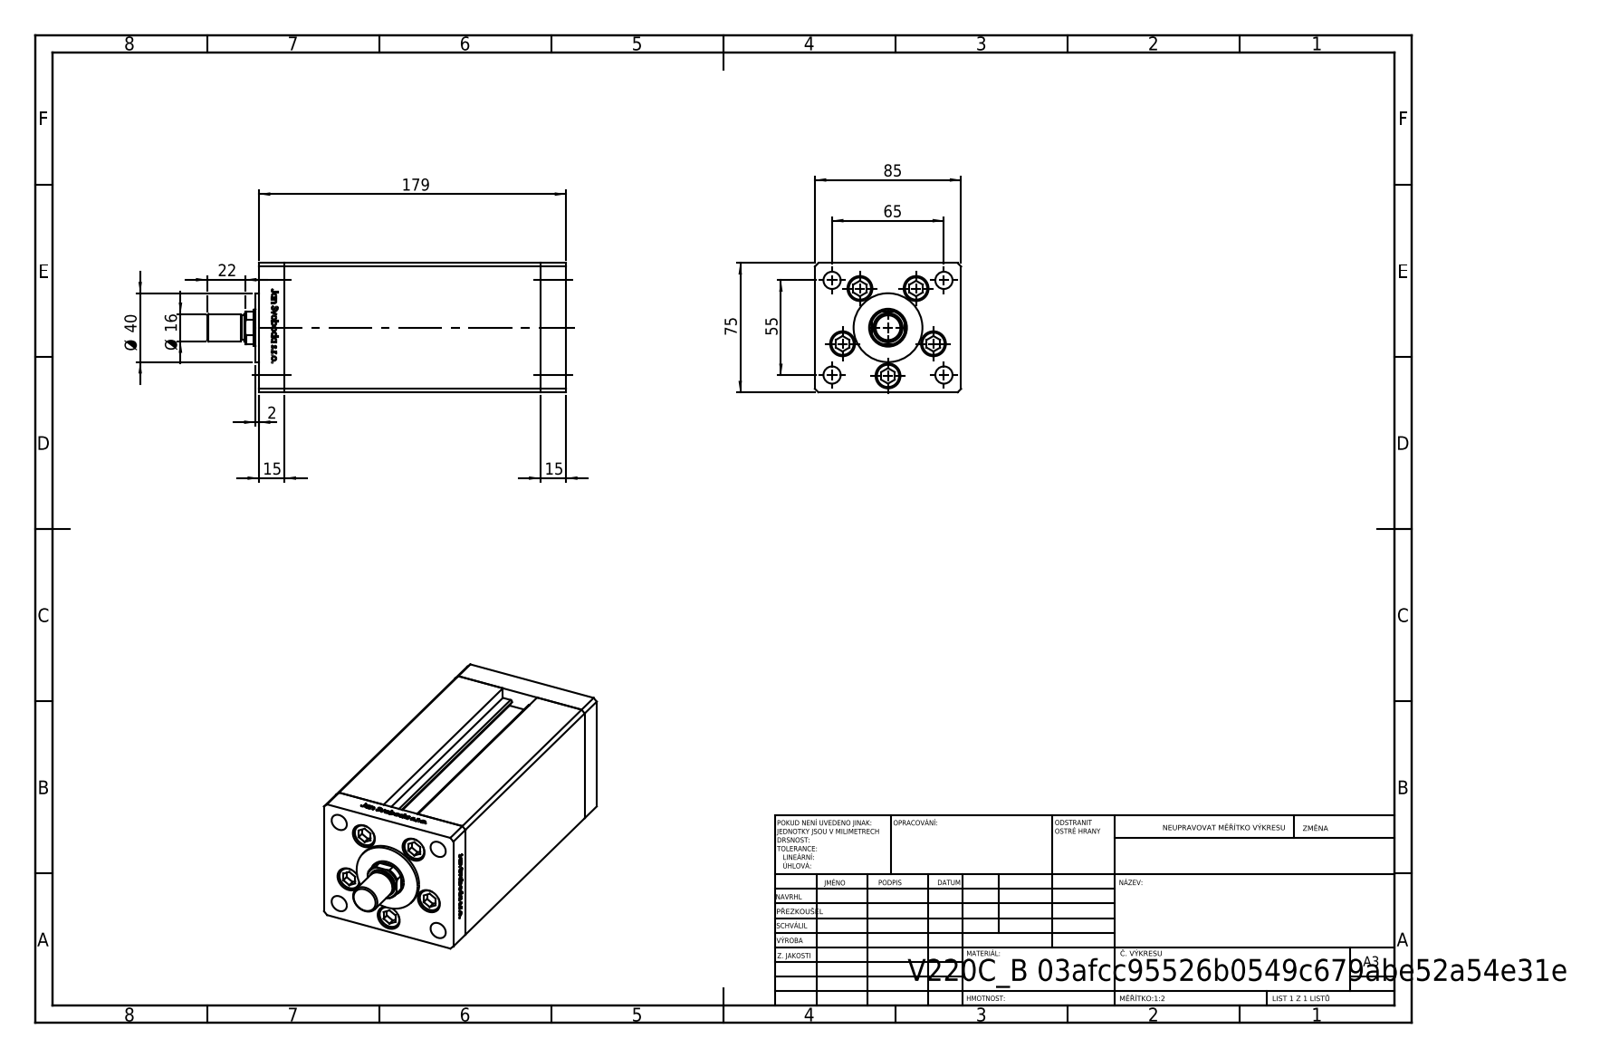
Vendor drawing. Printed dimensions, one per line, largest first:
179
85
75
65
55
Ø 40
22
Ø 16
15
15
2
